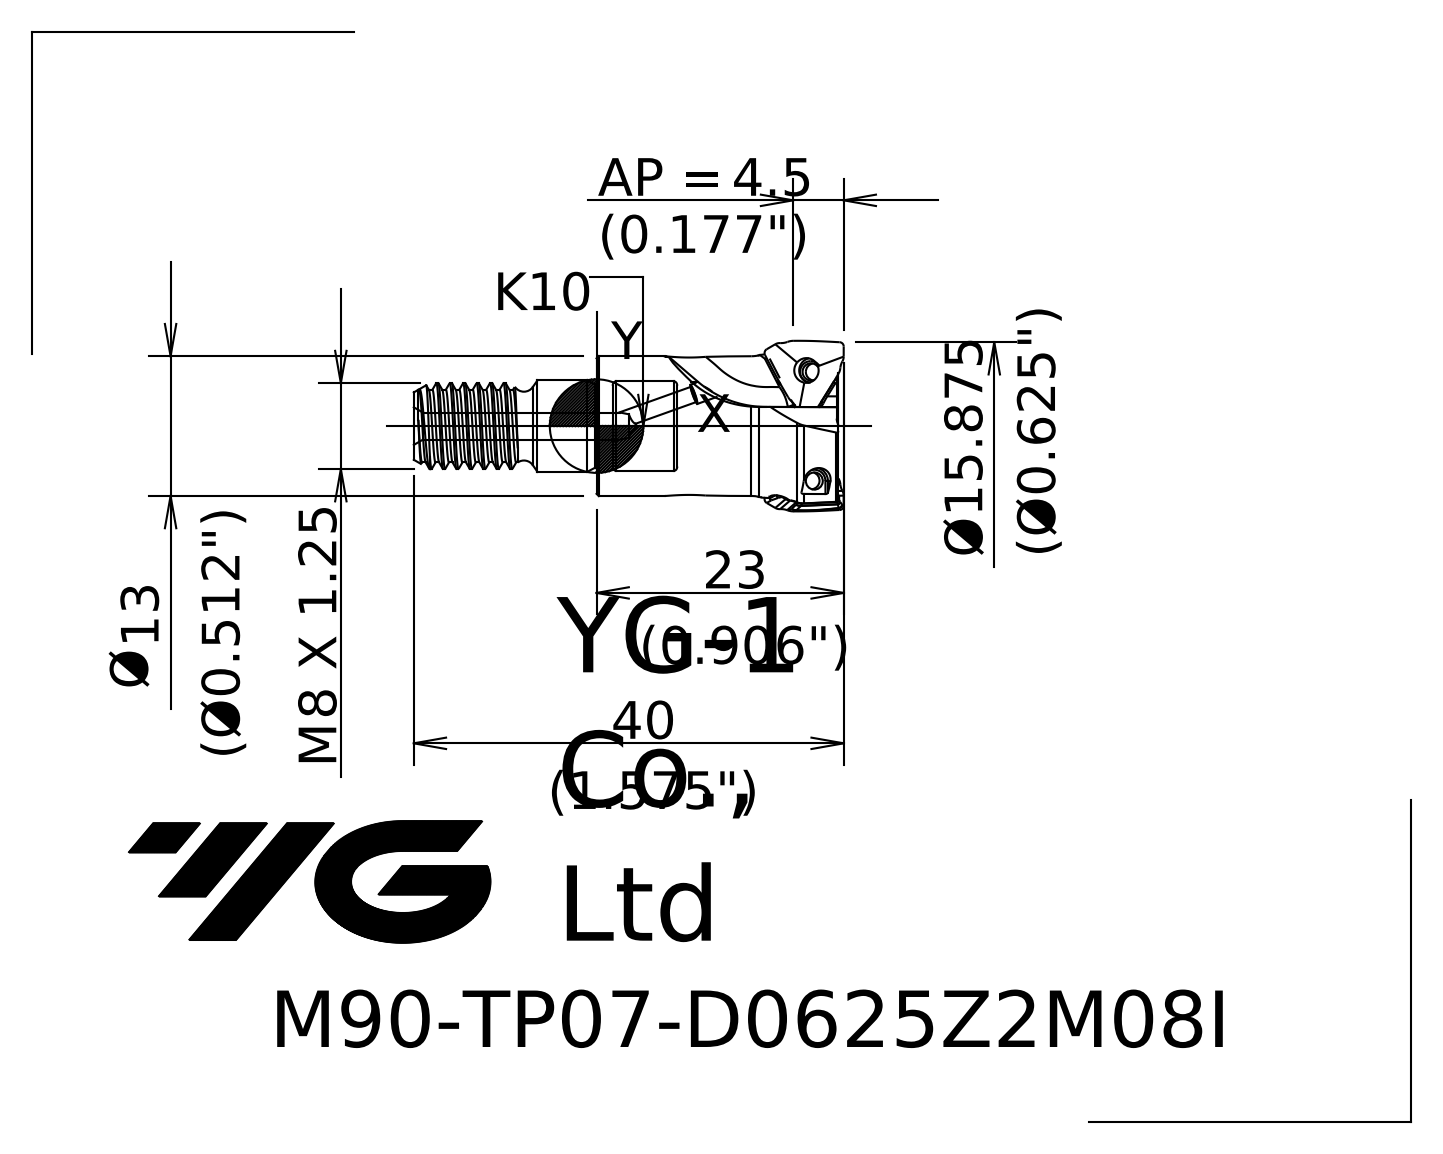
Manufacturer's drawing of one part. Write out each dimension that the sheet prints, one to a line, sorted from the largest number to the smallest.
40
23
Ø15.875
4.5 AP =
M X 1.25 8
